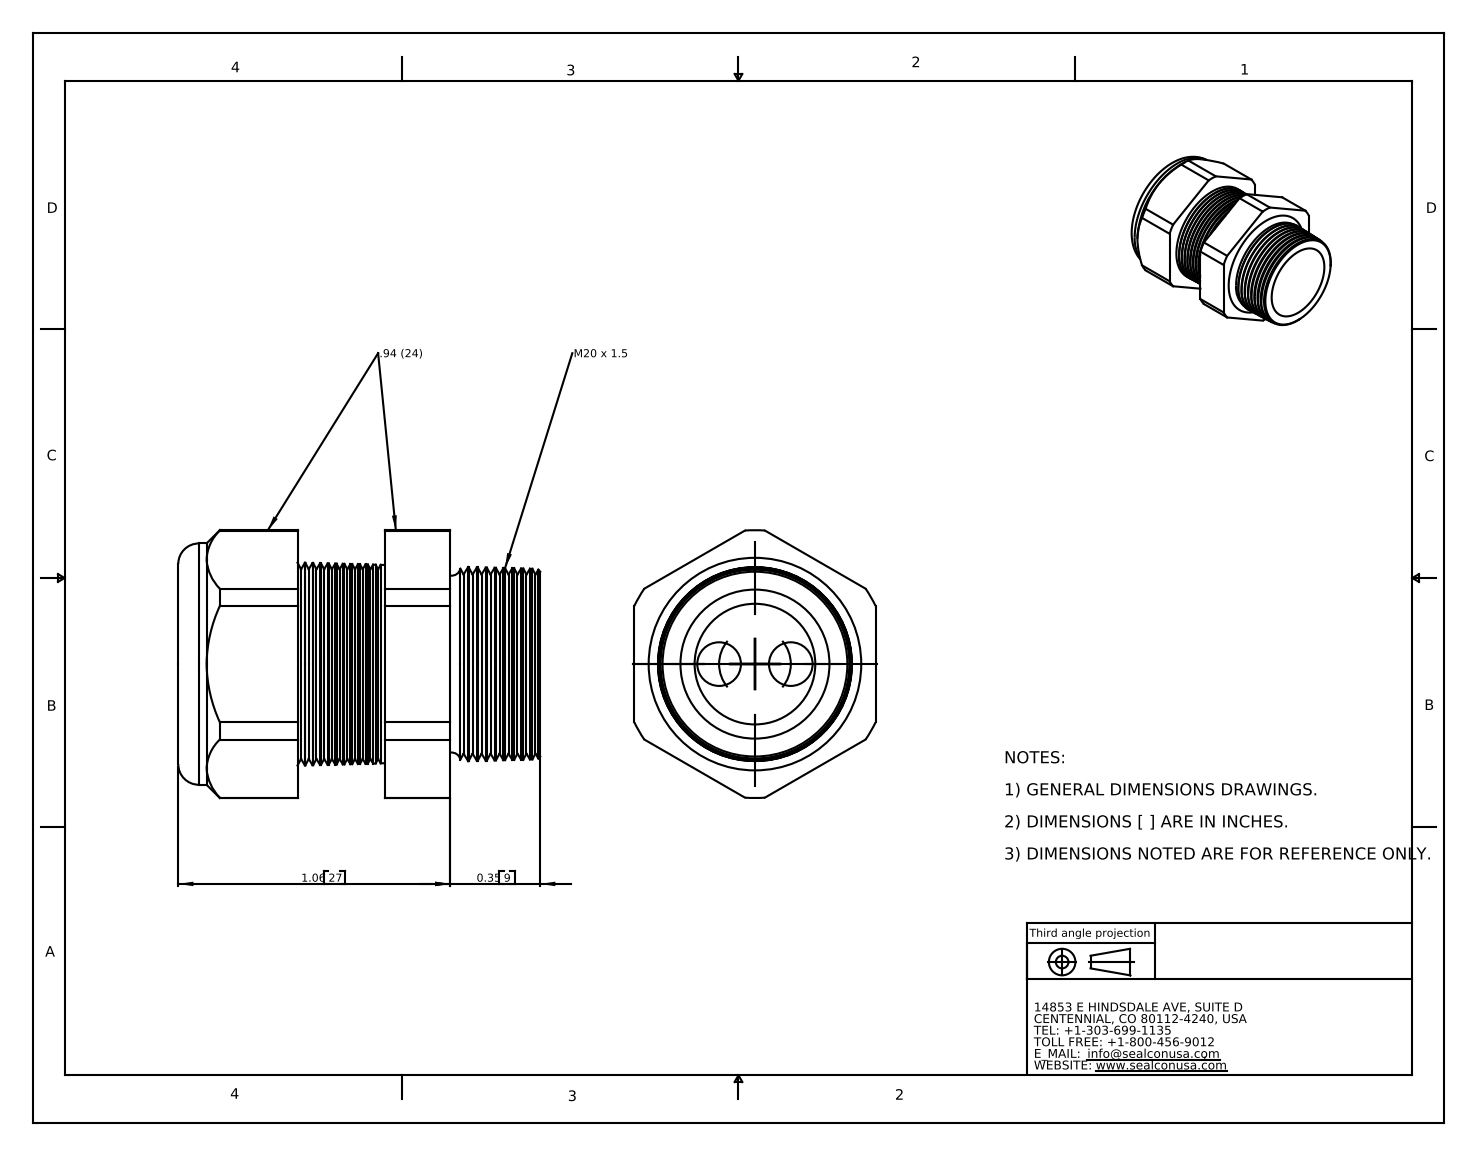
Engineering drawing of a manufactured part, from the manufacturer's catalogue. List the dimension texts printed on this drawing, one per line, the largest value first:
1.06 27
0.35 9
